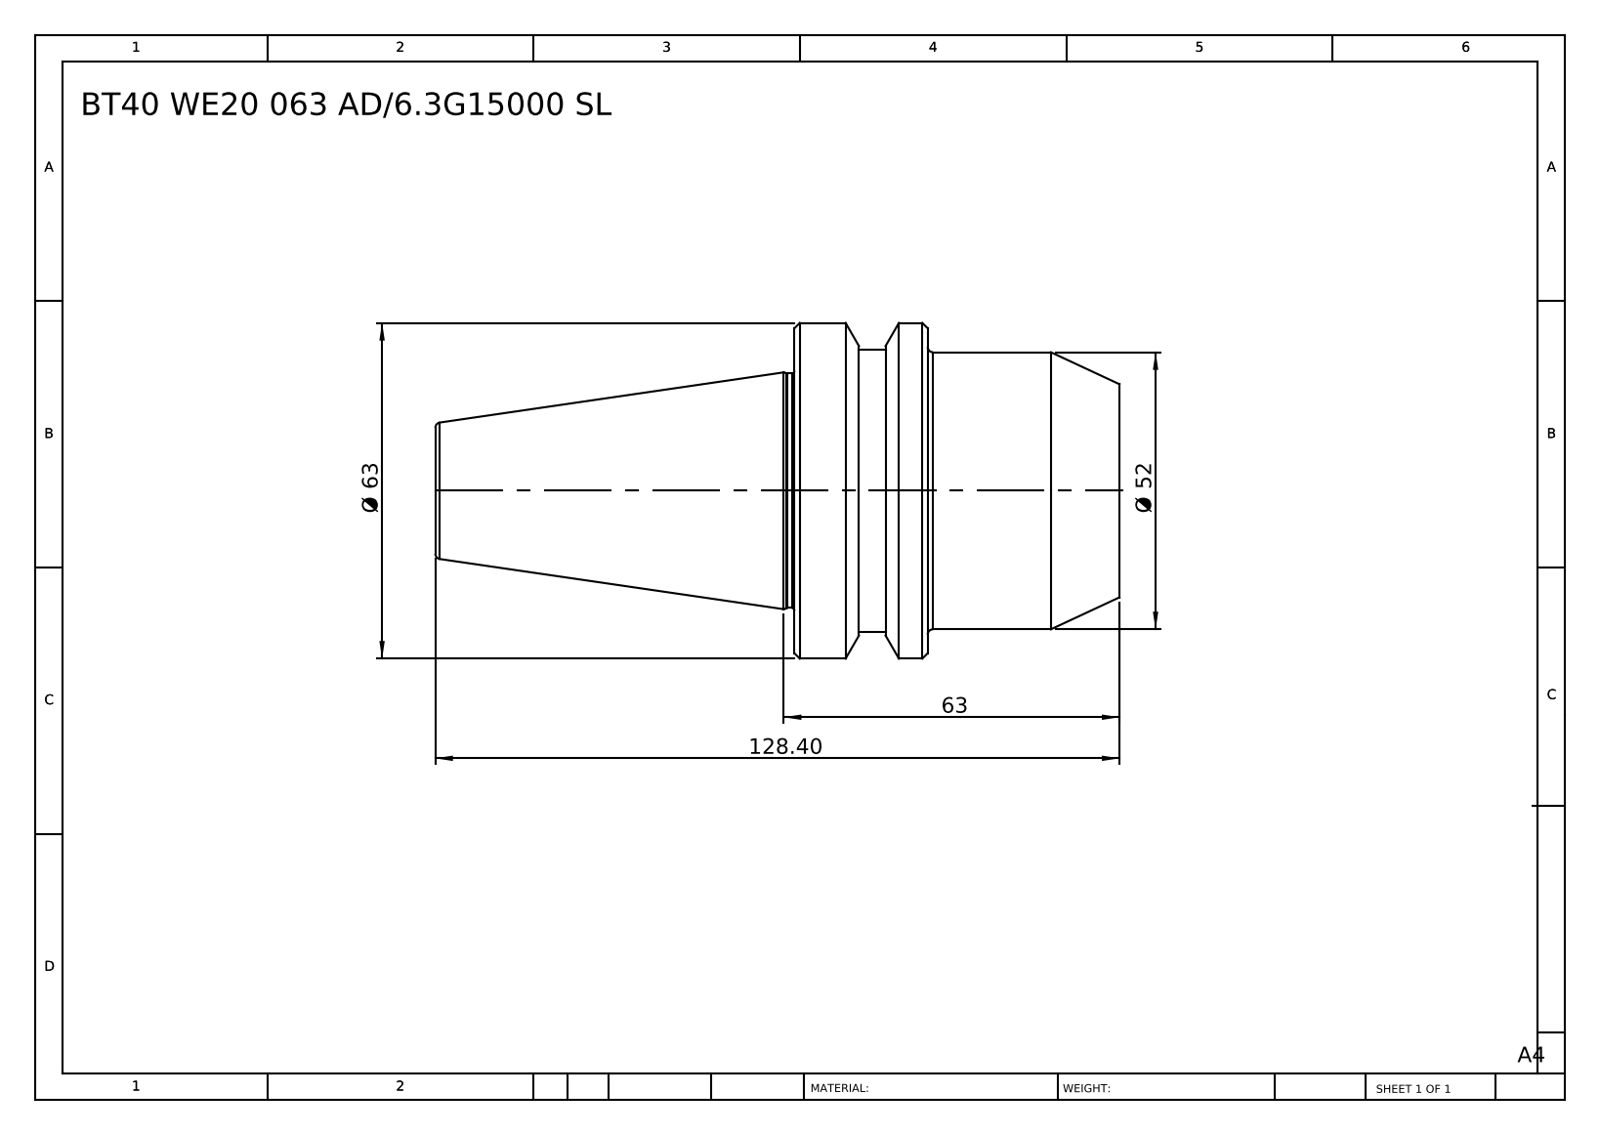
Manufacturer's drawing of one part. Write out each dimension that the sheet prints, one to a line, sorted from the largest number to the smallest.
128.40
63
Ø 63
Ø 52
